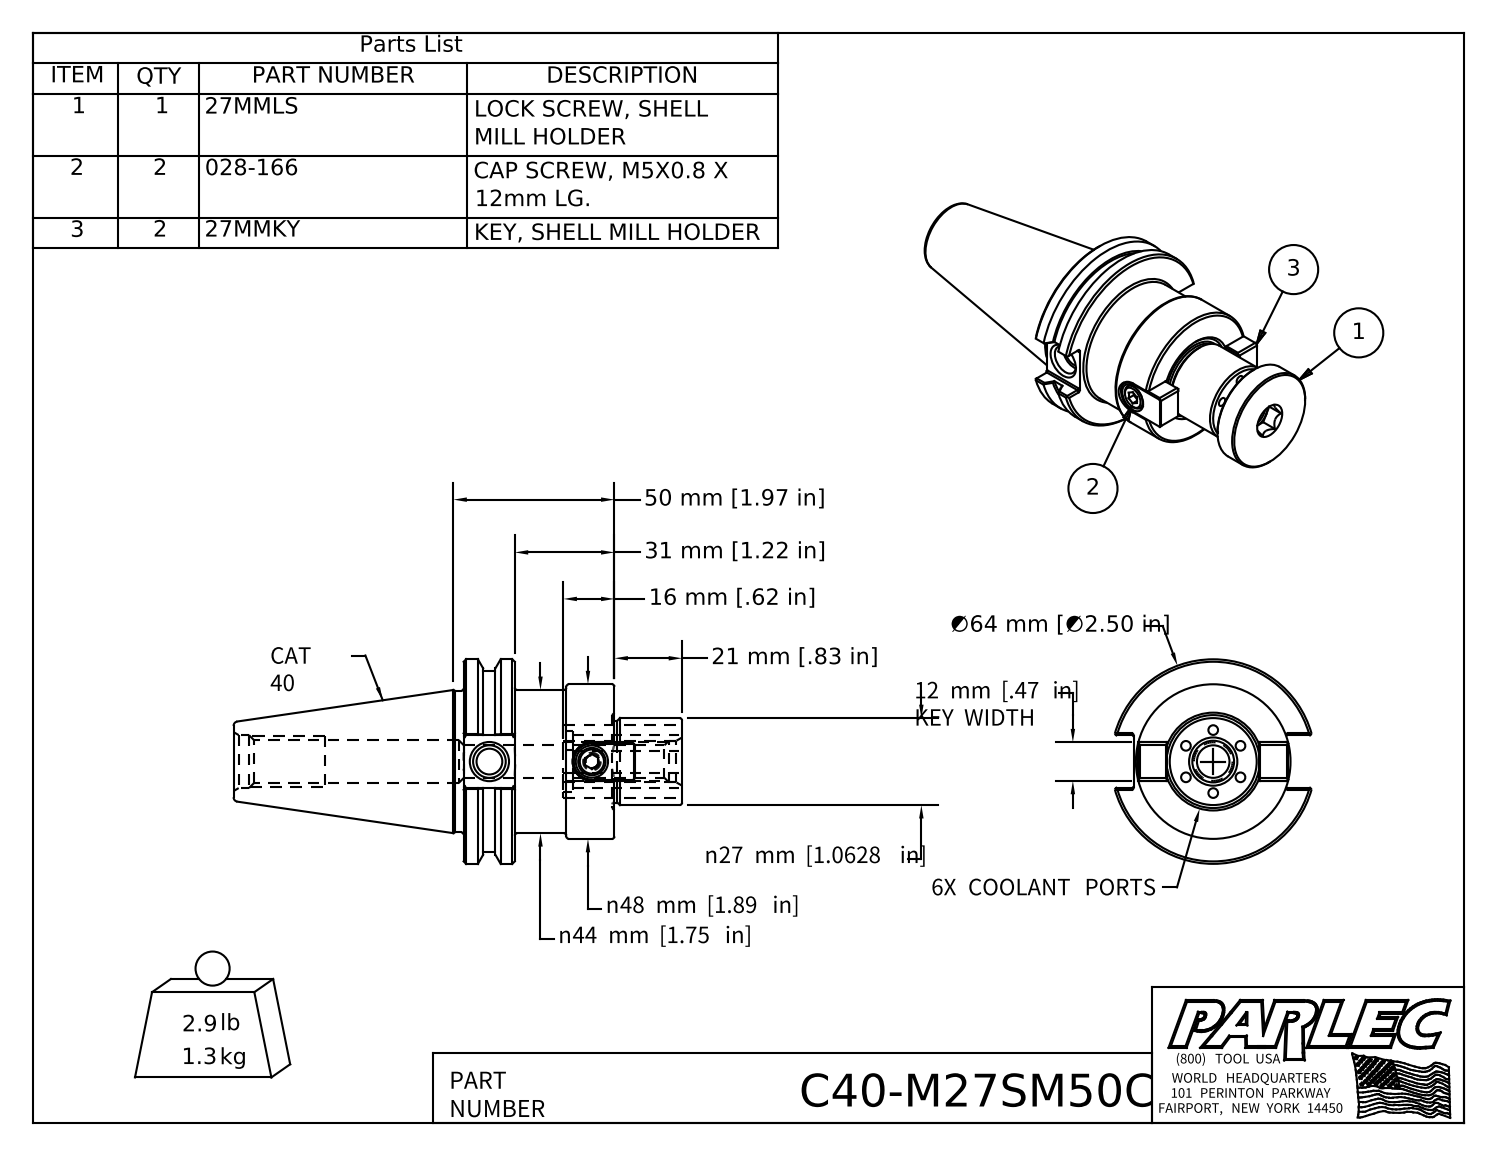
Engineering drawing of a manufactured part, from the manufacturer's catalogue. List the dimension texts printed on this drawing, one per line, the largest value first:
∅64 mm [∅2.50 in]
50 mm [1.97 in]
n48 mm [1.89 in]
n44 mm [1.75 in]
31 mm [1.22 in]
n27 mm [1.0628 in]
21 mm [.83 in]
16 mm [.62 in]
12 mm [.47 in] KEY WIDTH
6X COOLANT PORTS
